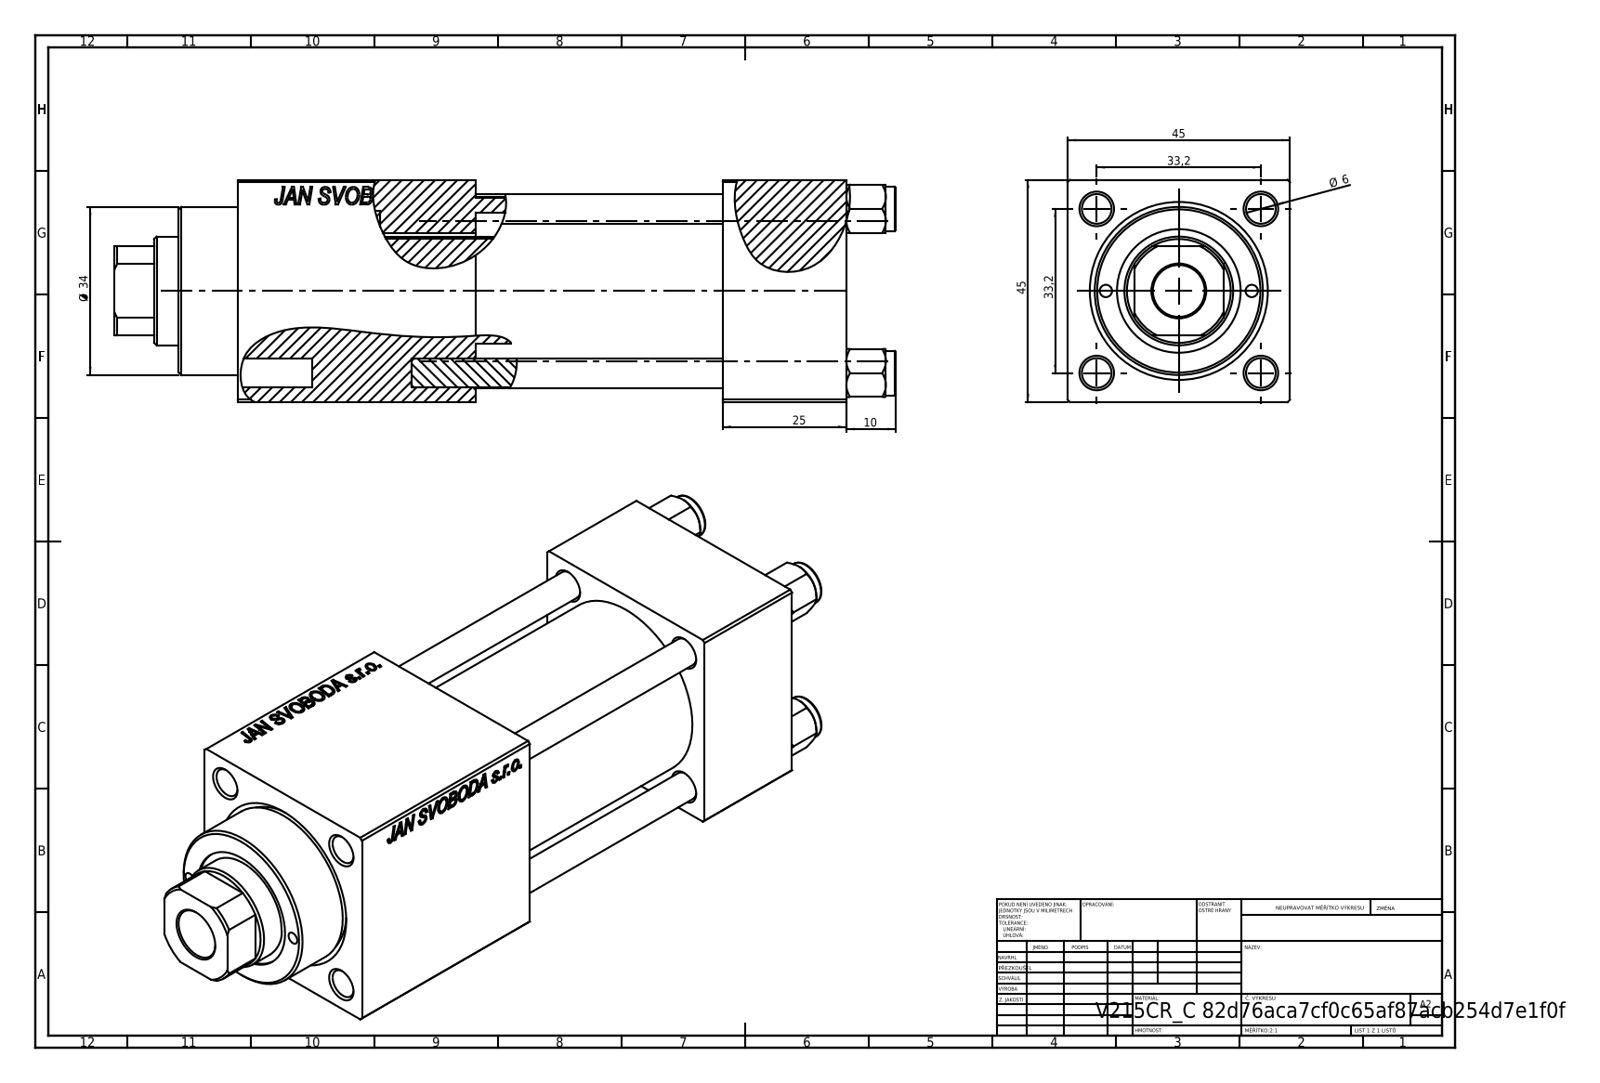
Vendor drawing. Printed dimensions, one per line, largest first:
45
45
Ø 34
33,2
33,2
25
10
Ø 6
